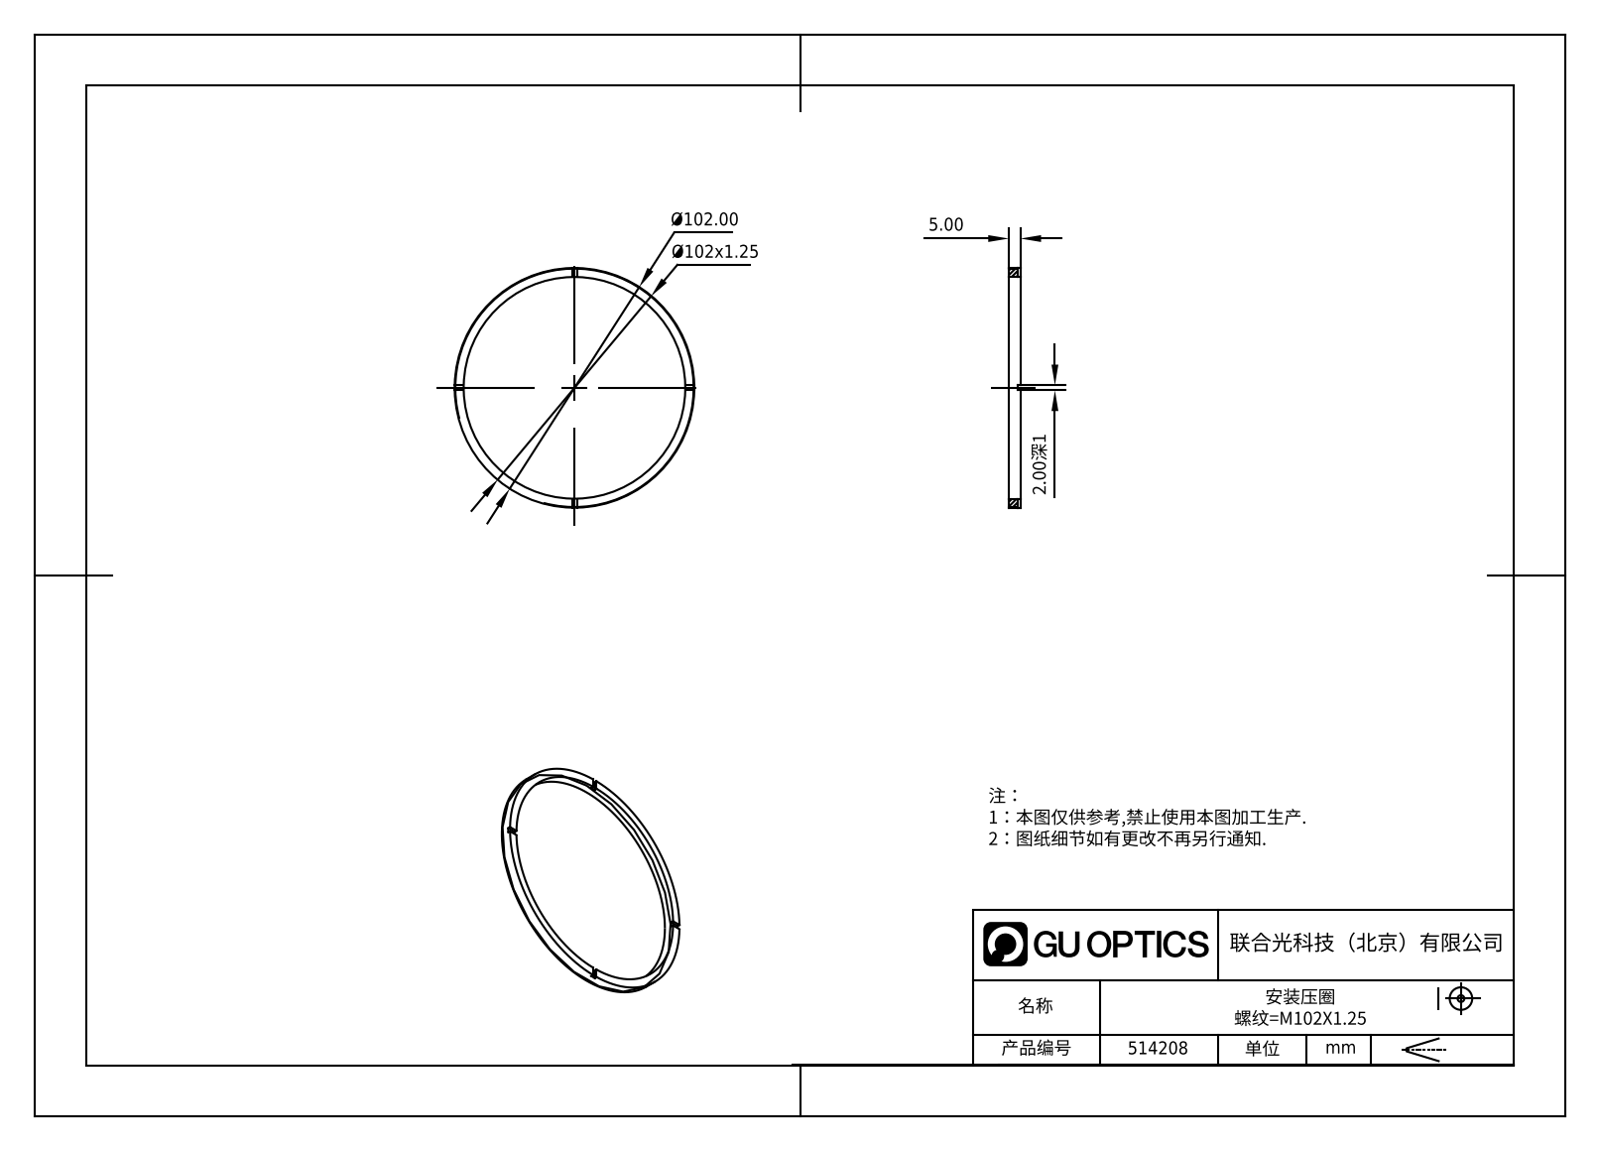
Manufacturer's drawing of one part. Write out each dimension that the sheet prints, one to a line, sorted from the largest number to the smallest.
Ø102.00
Ø102x1.25
5.00
2.00深1
